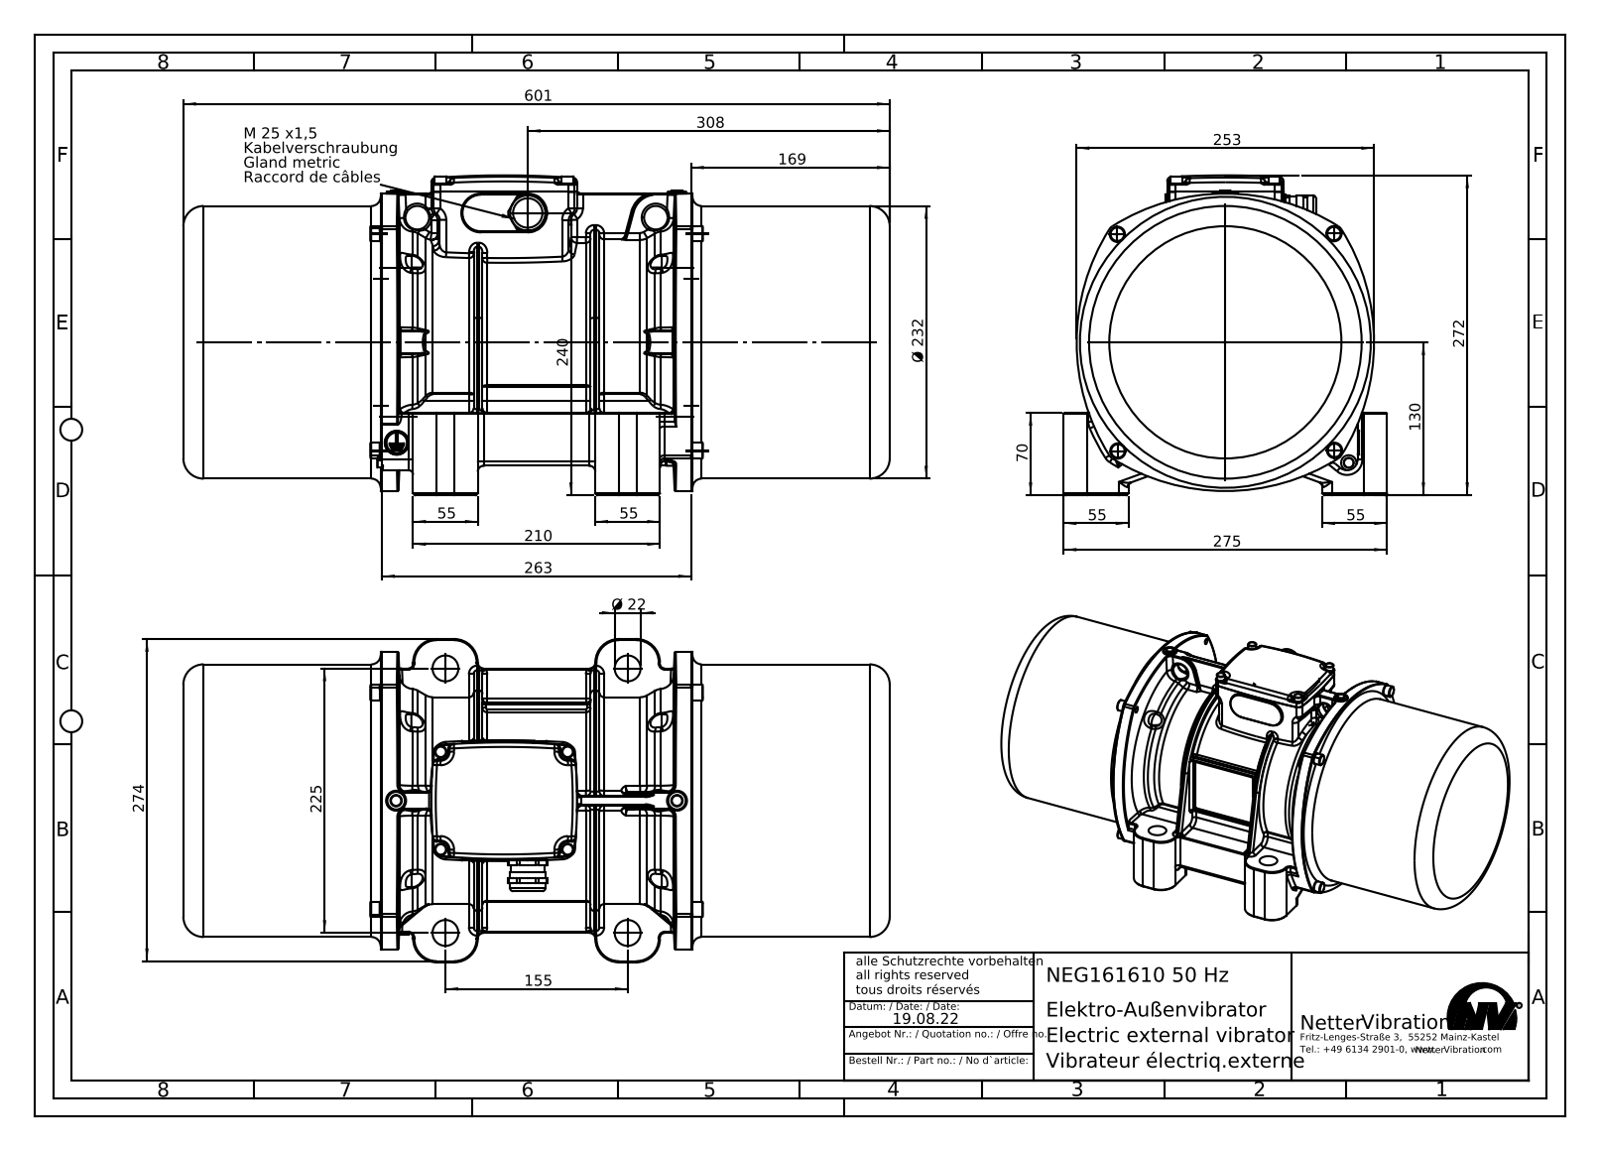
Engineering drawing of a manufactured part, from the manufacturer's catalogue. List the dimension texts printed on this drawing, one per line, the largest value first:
601
308
275
274
272
263
253
240
Ø 232
225
210
169
155
130
70
55
55
55
55
Ø 22
